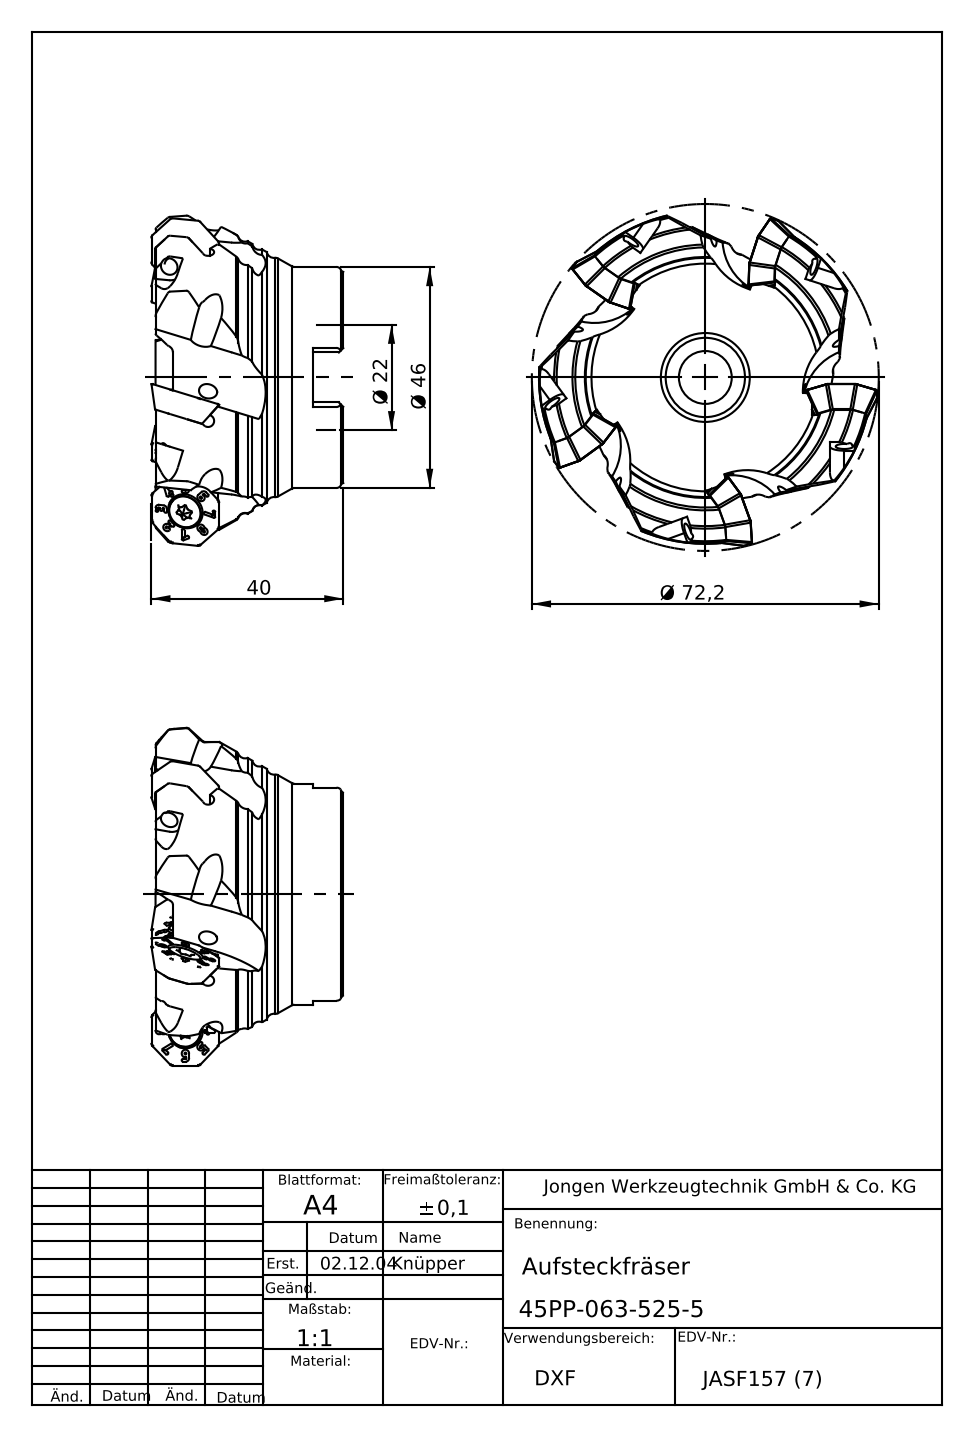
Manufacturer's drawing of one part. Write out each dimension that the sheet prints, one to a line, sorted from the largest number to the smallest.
Ø 72,2
Ø 46
40
Ø 22
